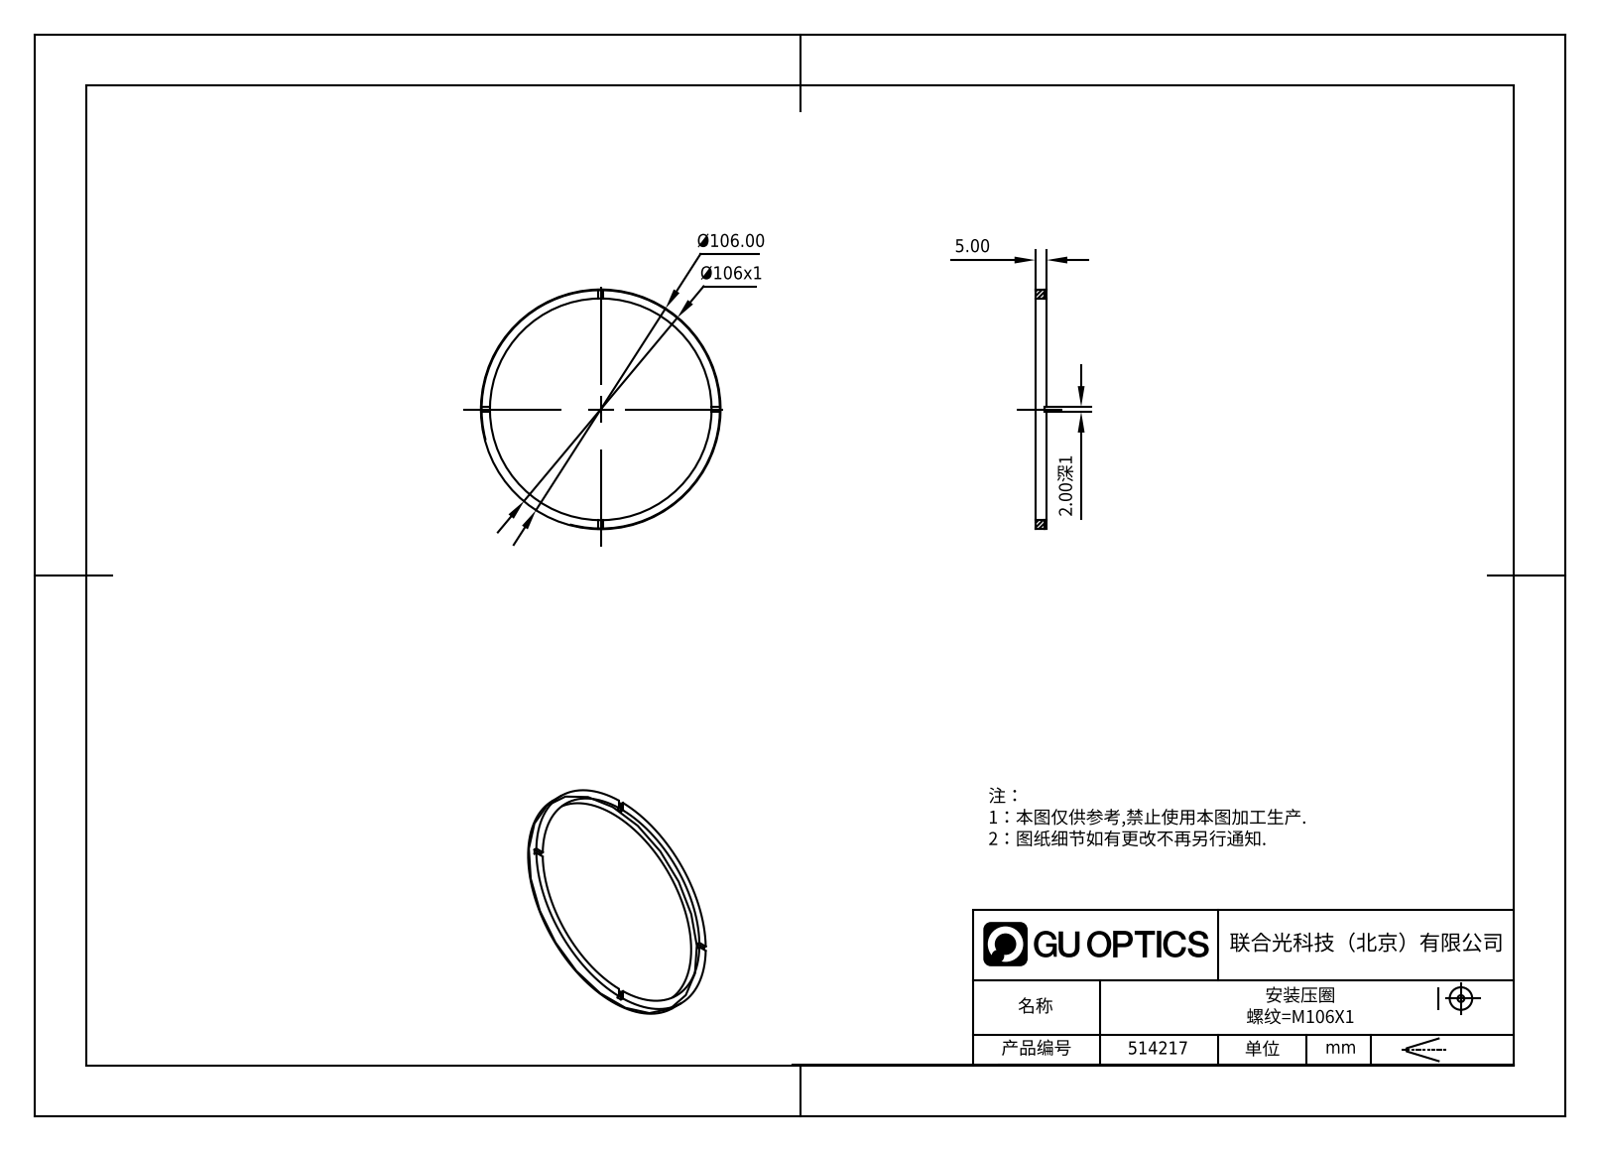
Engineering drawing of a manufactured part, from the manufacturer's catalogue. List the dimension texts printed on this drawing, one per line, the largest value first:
Ø106.00
Ø106x1
5.00
2.00深1
